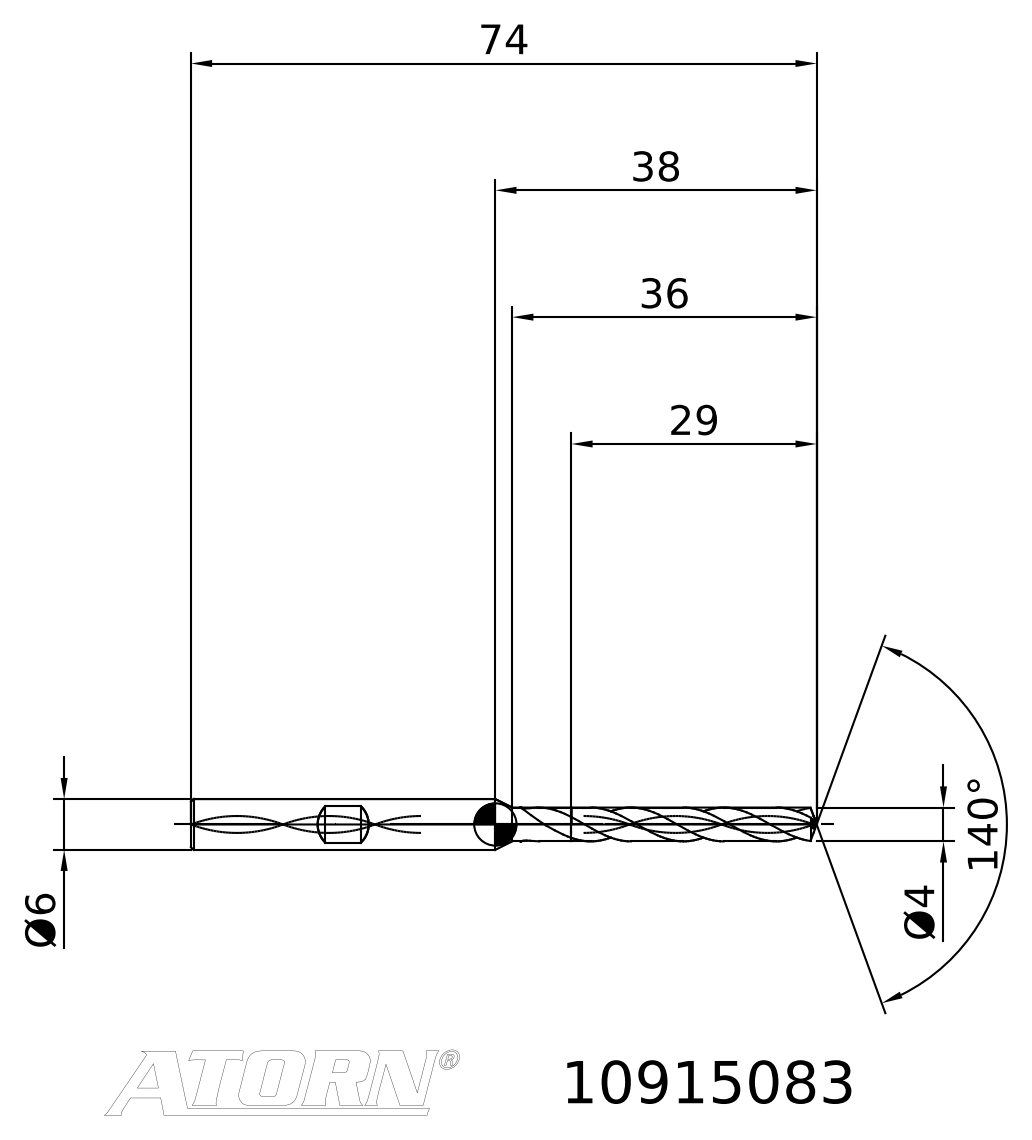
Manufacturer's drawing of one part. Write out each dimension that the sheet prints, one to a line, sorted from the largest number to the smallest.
140°
74
38
36
29
Ø6
Ø4
